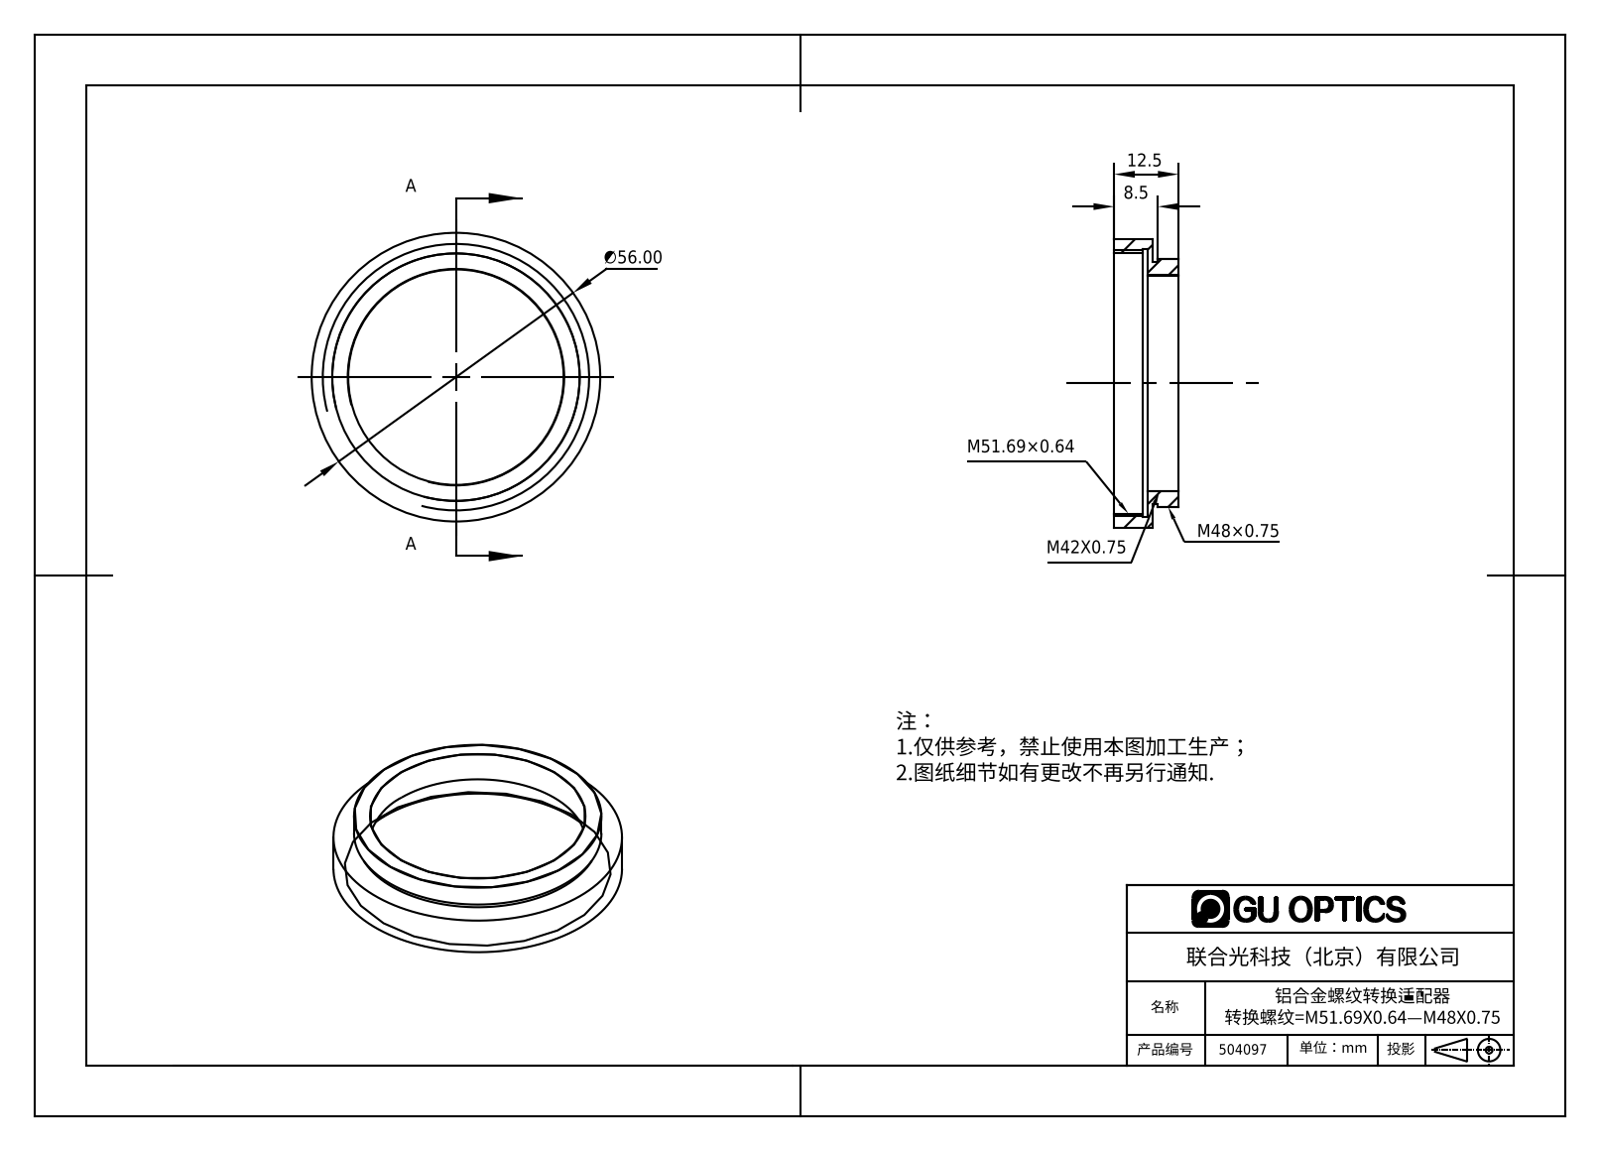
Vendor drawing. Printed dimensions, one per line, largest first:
∅56.00
12.5
8.5
